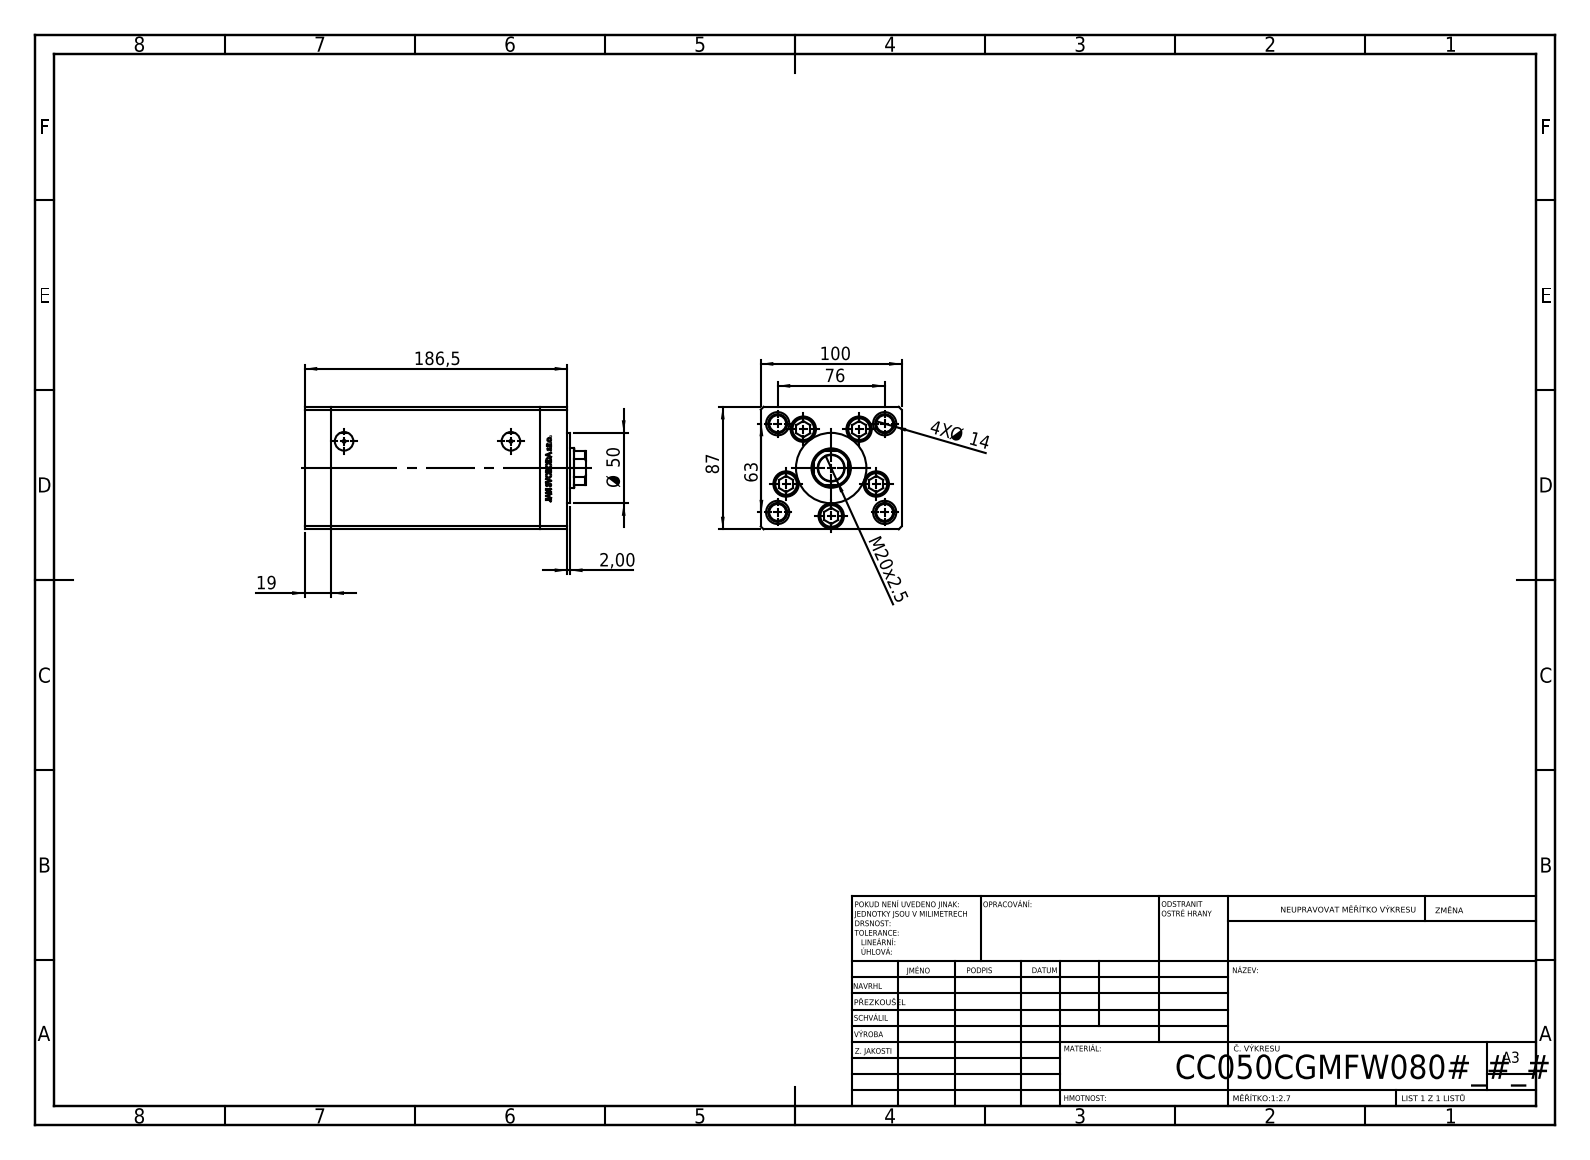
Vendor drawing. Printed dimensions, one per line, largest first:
186,5
100
87
76
63
Ø 50
M20x2.5
19
4X Ø 14
2,00
